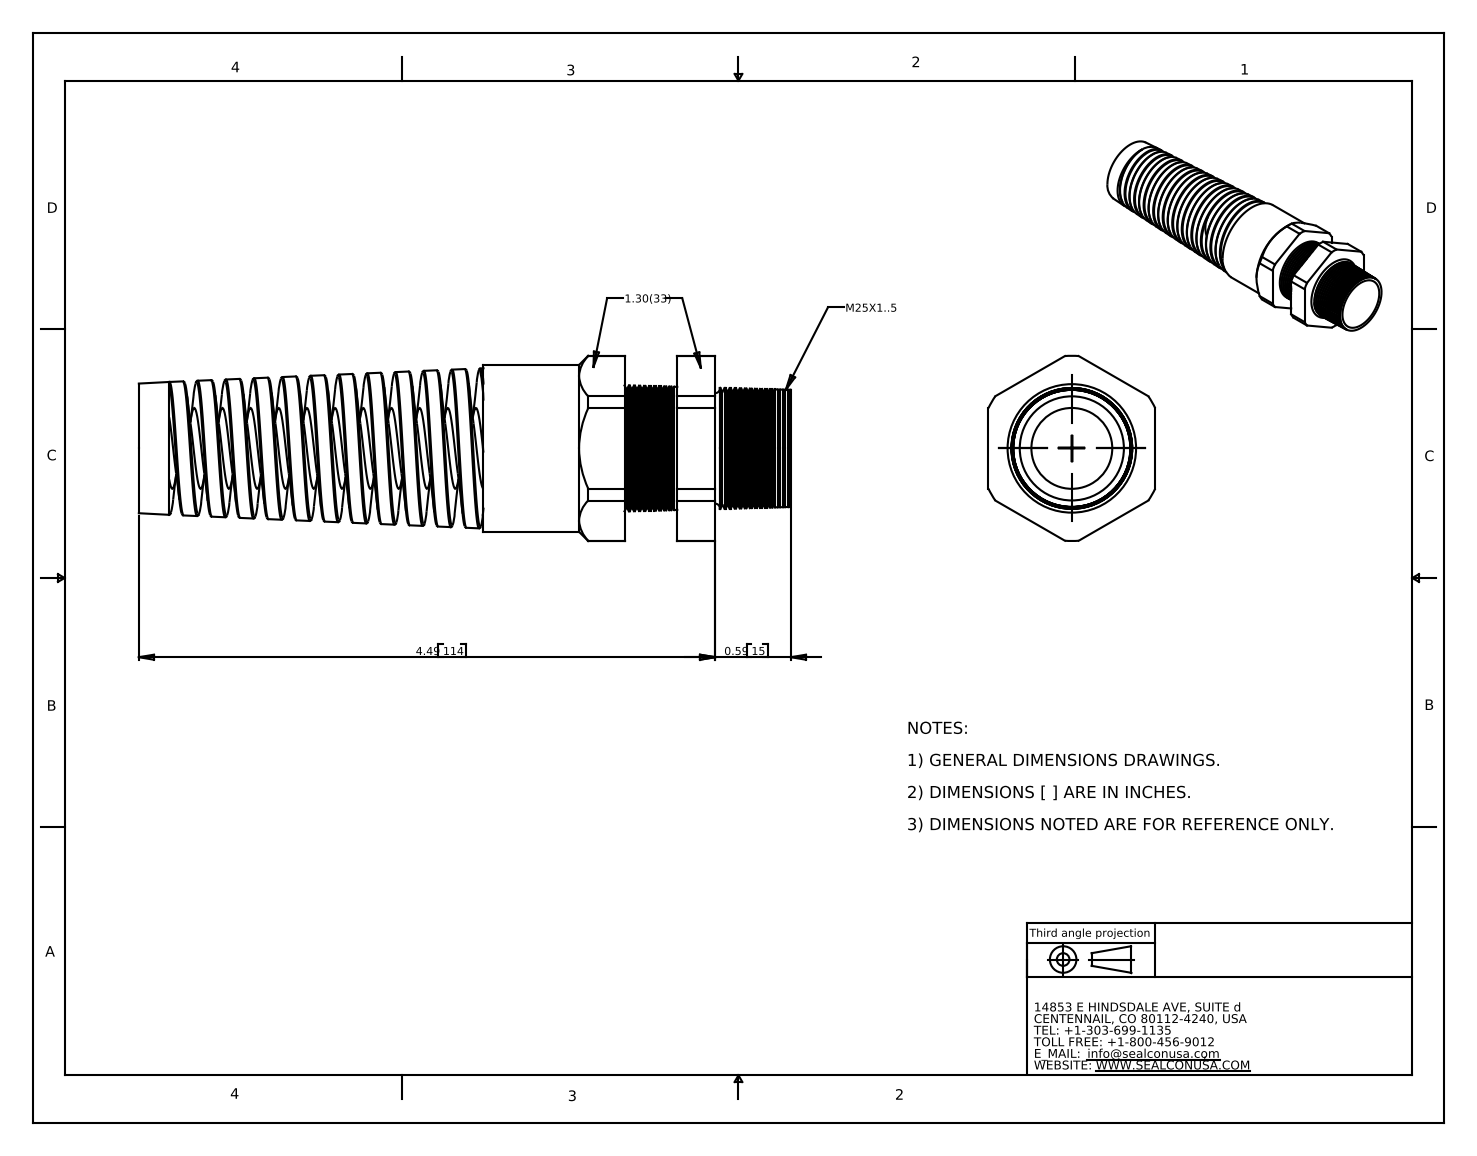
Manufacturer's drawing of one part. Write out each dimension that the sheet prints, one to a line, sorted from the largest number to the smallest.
4.49 114
0.59 15
